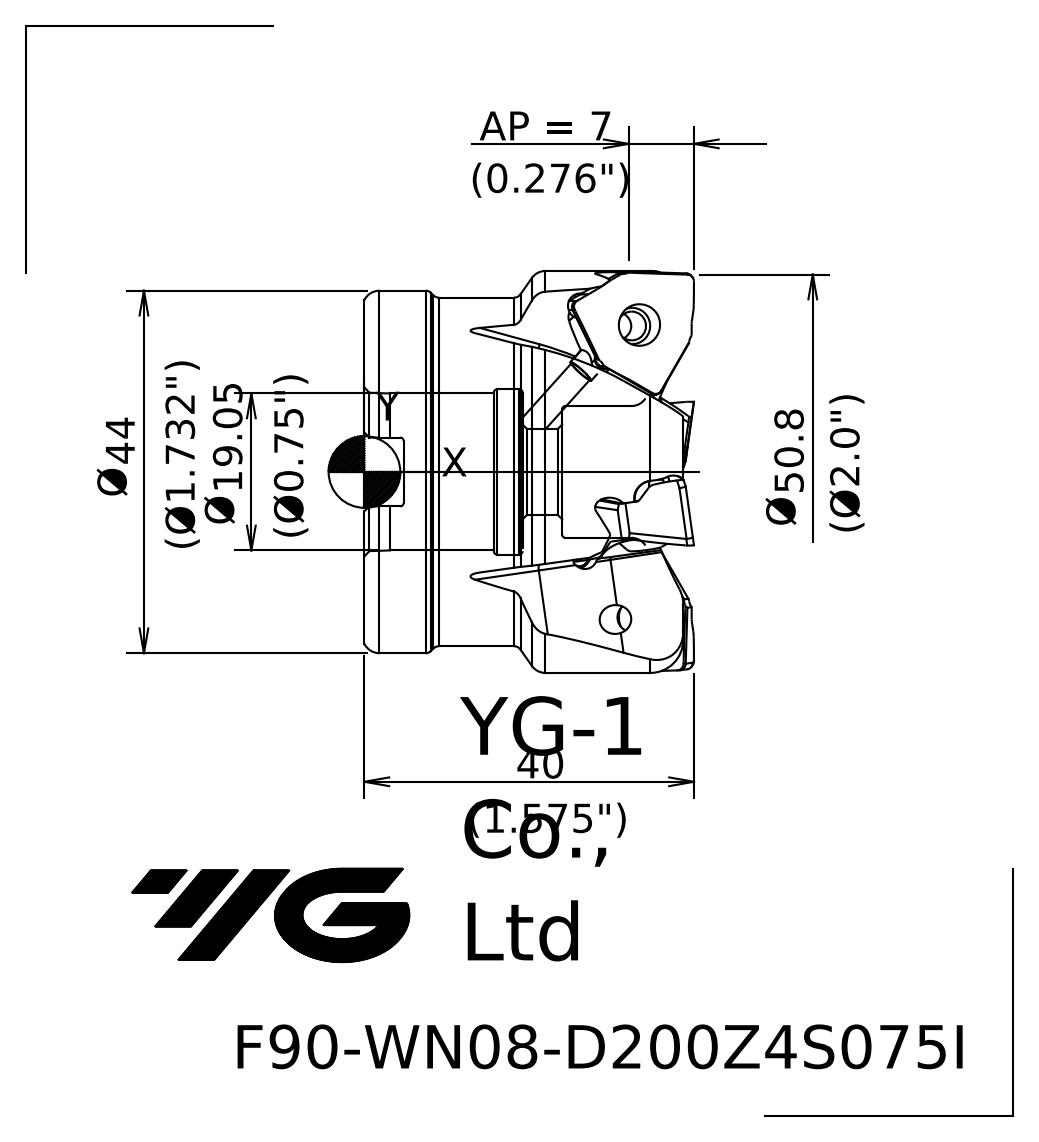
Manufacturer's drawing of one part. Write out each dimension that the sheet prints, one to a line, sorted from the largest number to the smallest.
50.8 Ø
40
19.05 Ø
AP = 7
